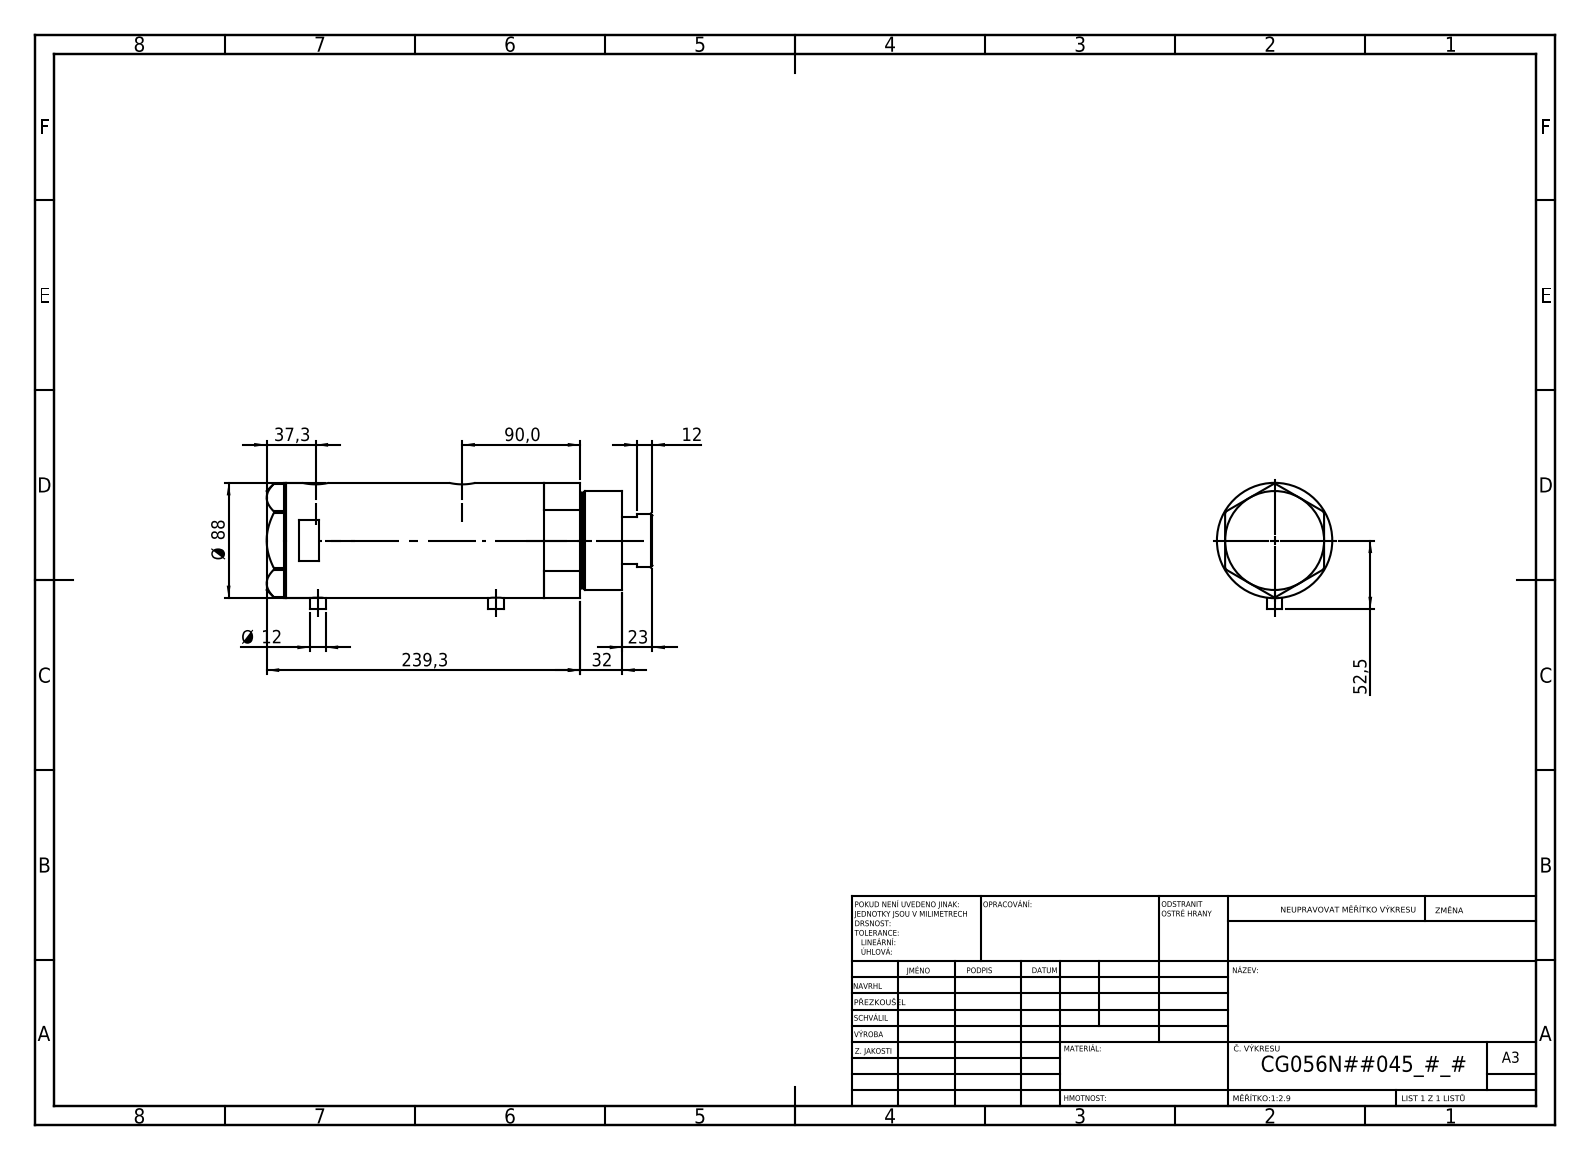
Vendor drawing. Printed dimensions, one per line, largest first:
239,3
90,0
Ø 88
52,5
37,3
32
23
12
Ø 12
